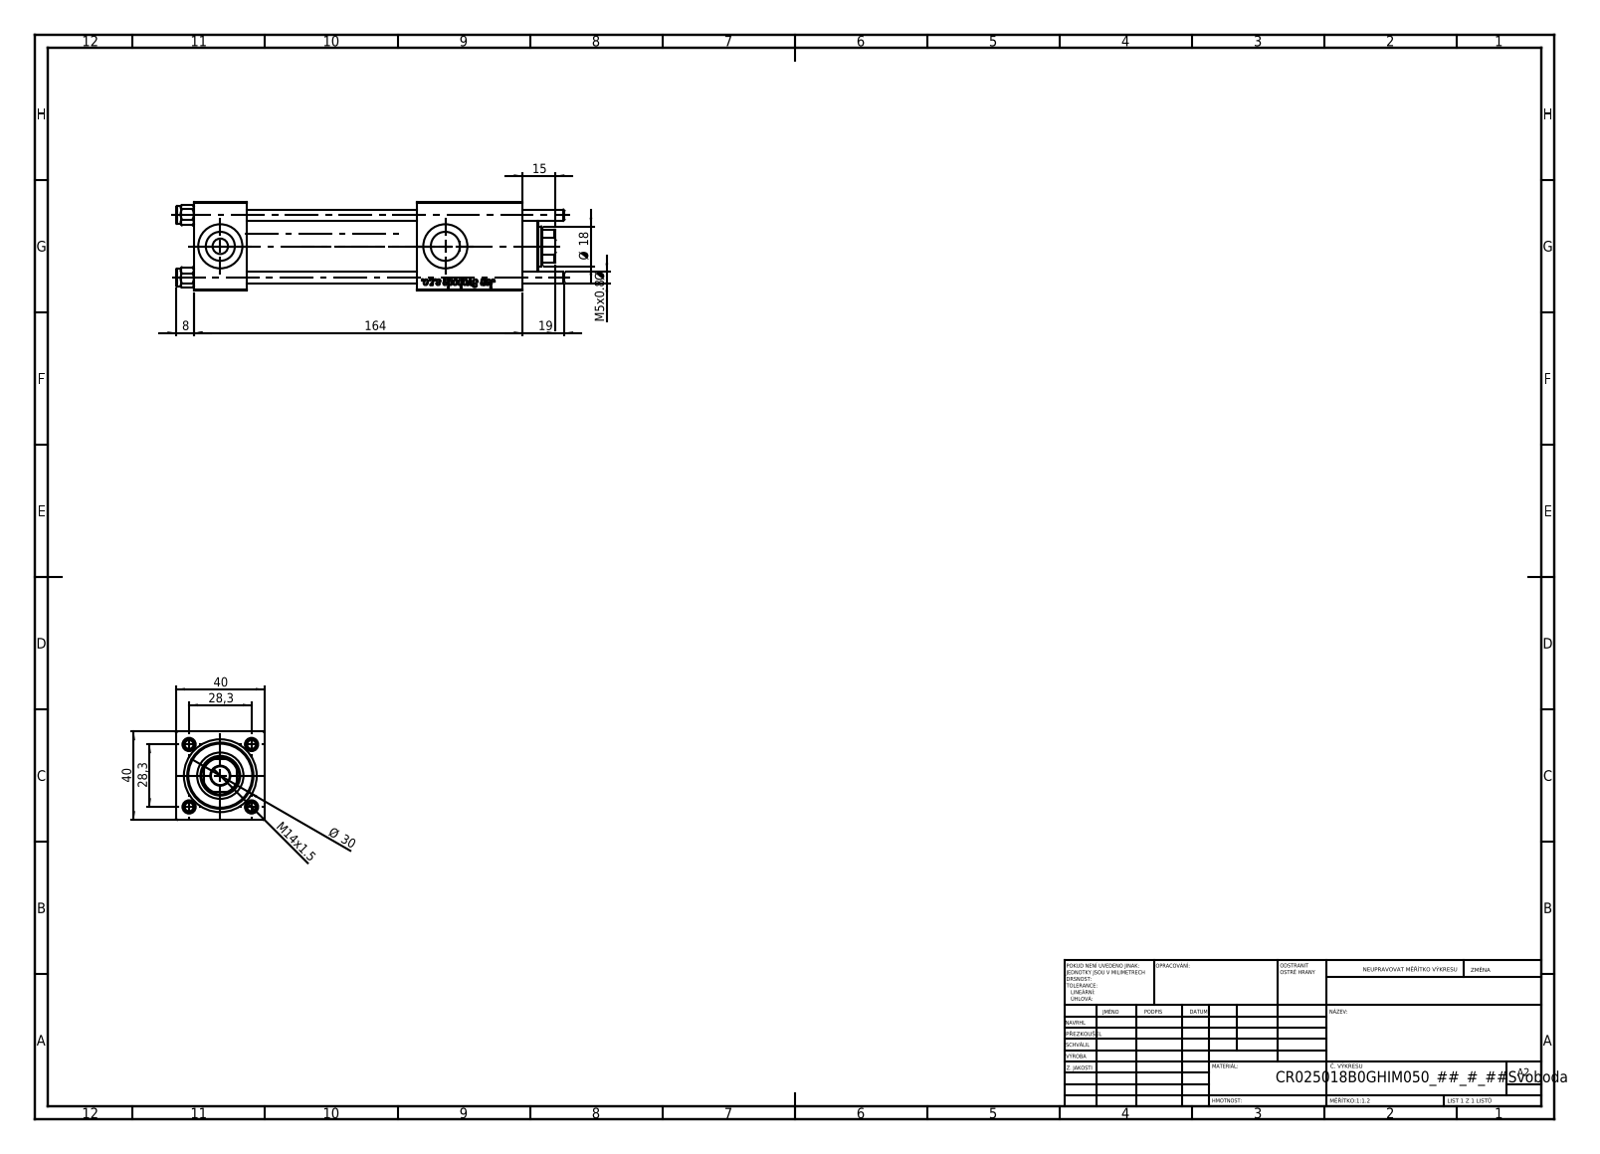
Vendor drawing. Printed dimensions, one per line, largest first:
164
40
40
Ø 30
28,3
28,3
19
Ø 18
15
M14x1.5
8
M5x0.8 Ø
